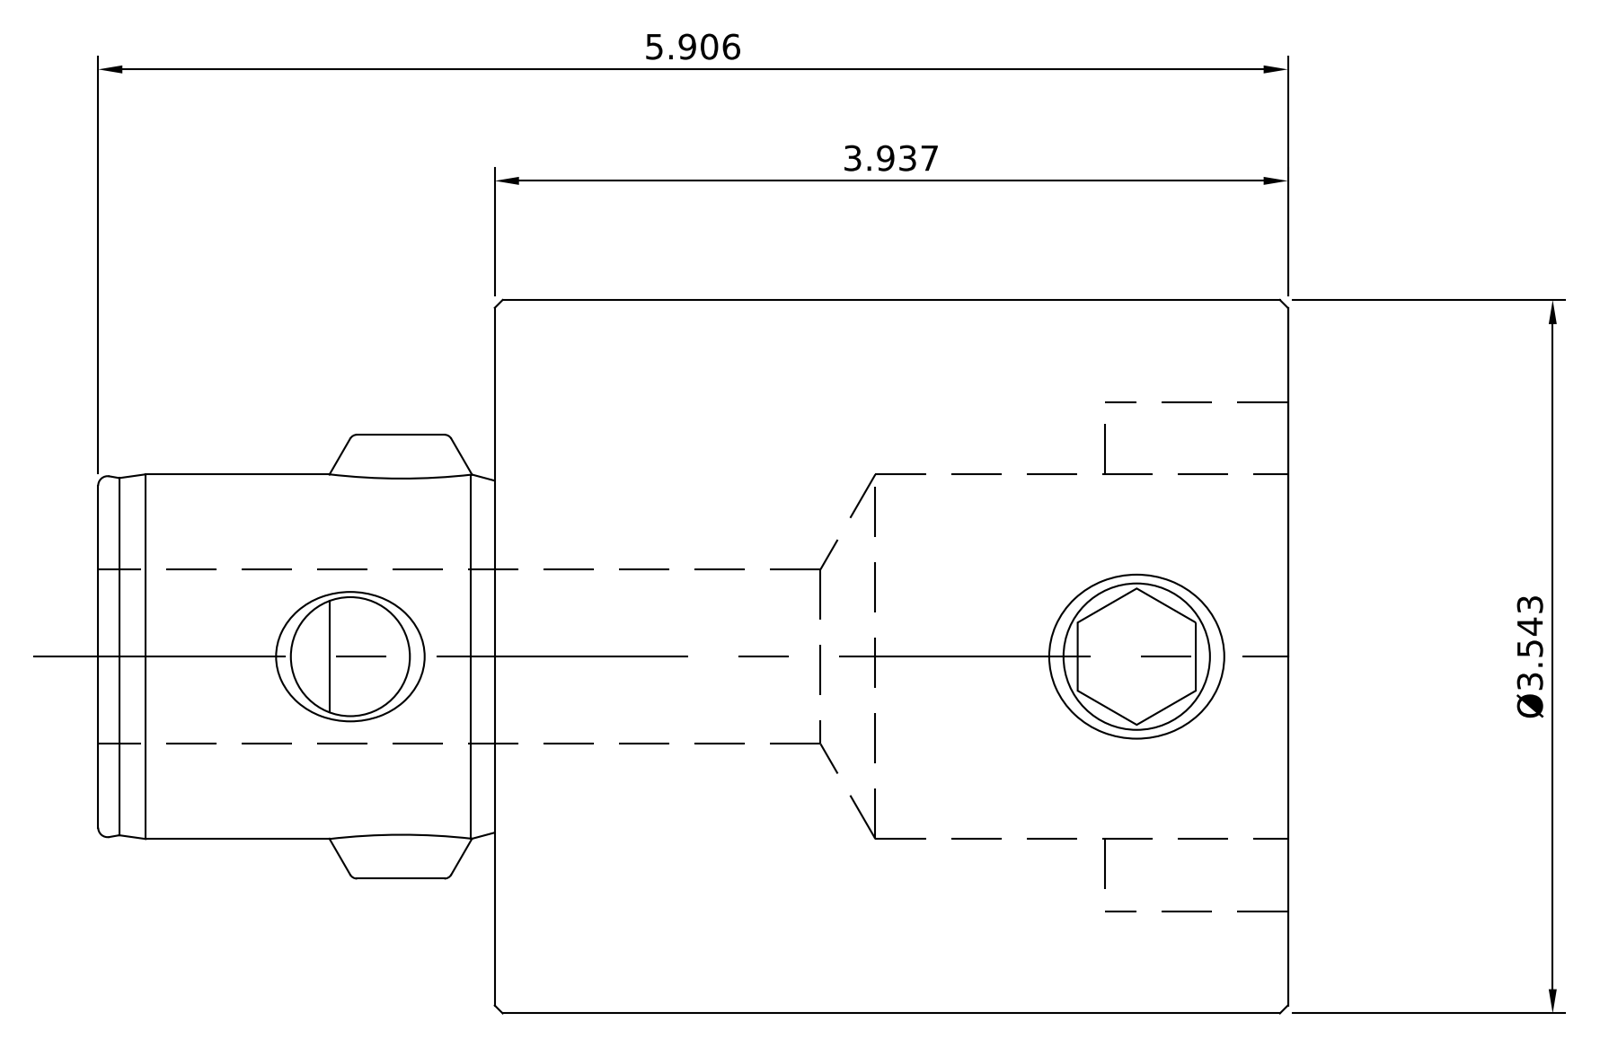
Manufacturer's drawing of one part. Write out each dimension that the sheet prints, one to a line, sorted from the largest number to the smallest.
5.906
3.937
Ø3.543
